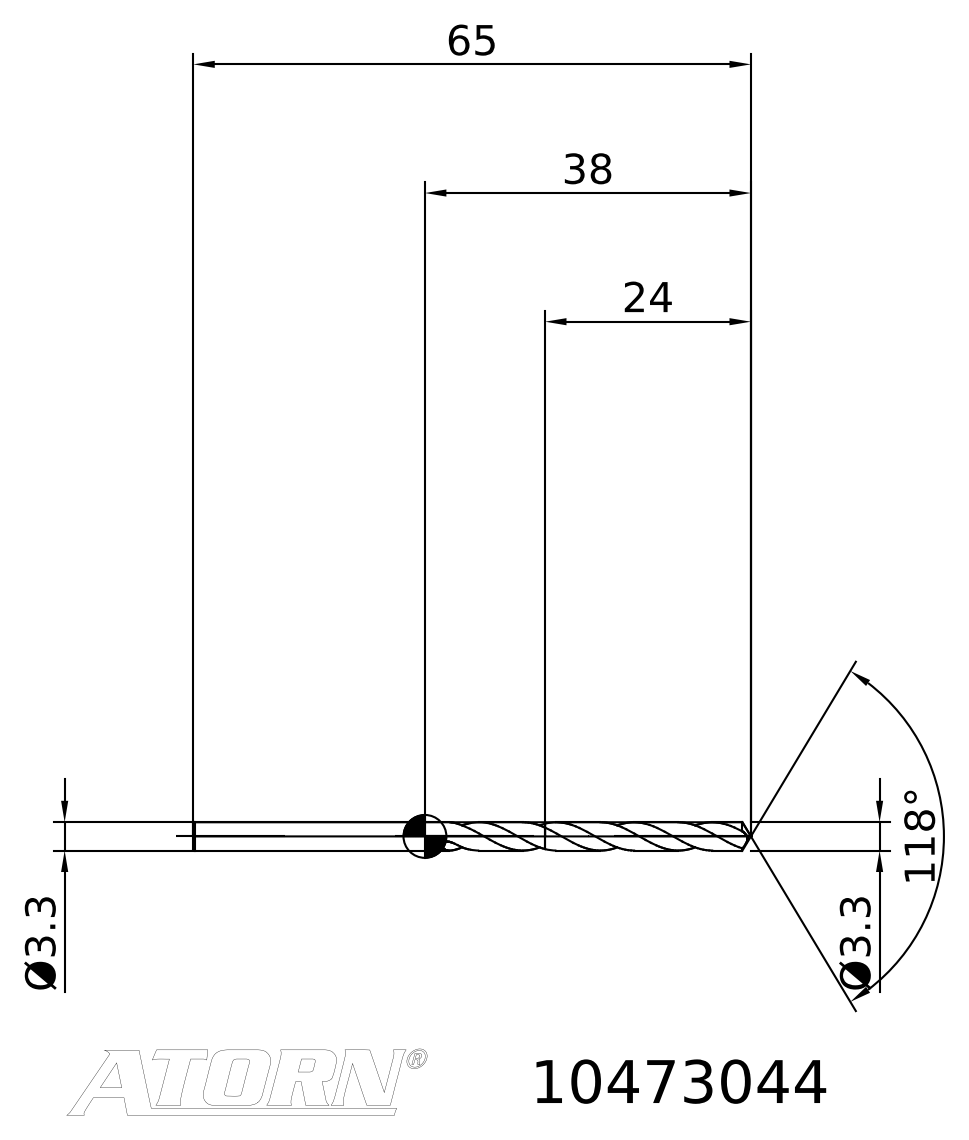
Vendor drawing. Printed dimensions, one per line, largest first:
118°
65
38
24
Ø3.3
Ø3.3
